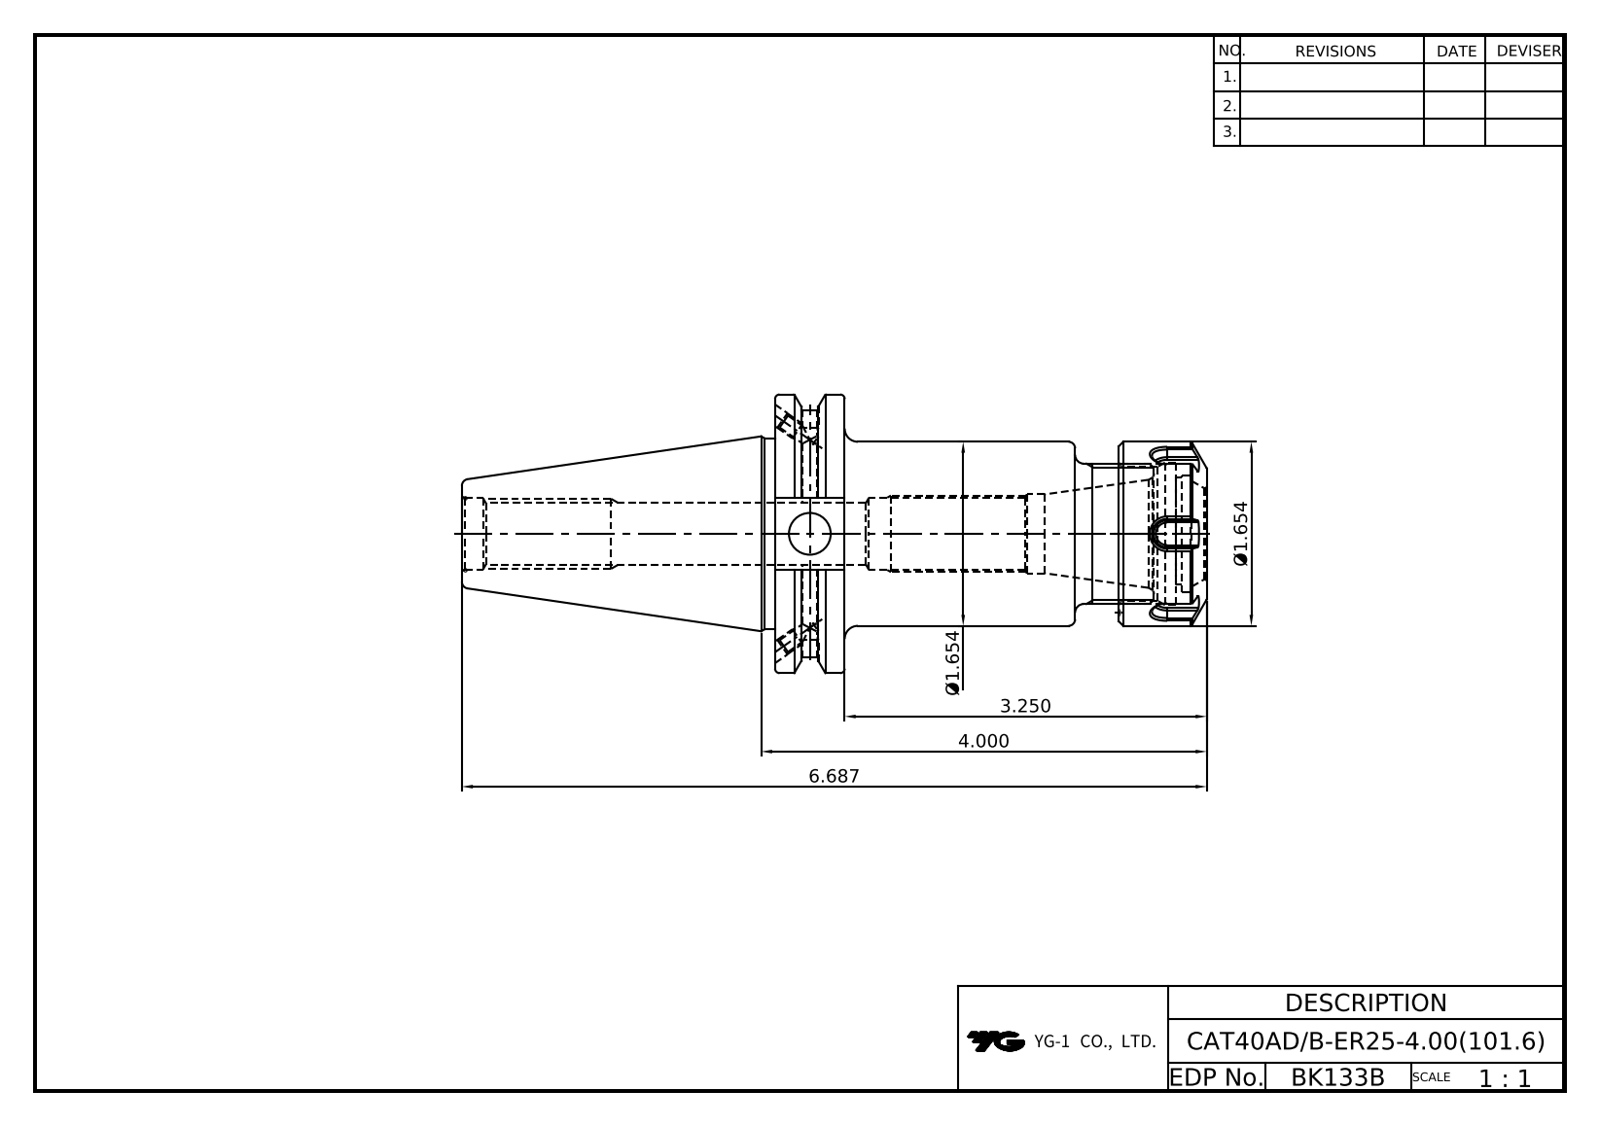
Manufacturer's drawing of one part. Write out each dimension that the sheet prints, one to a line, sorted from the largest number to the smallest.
6.687
4.000
3.250
Ø1.654
Ø1.654
